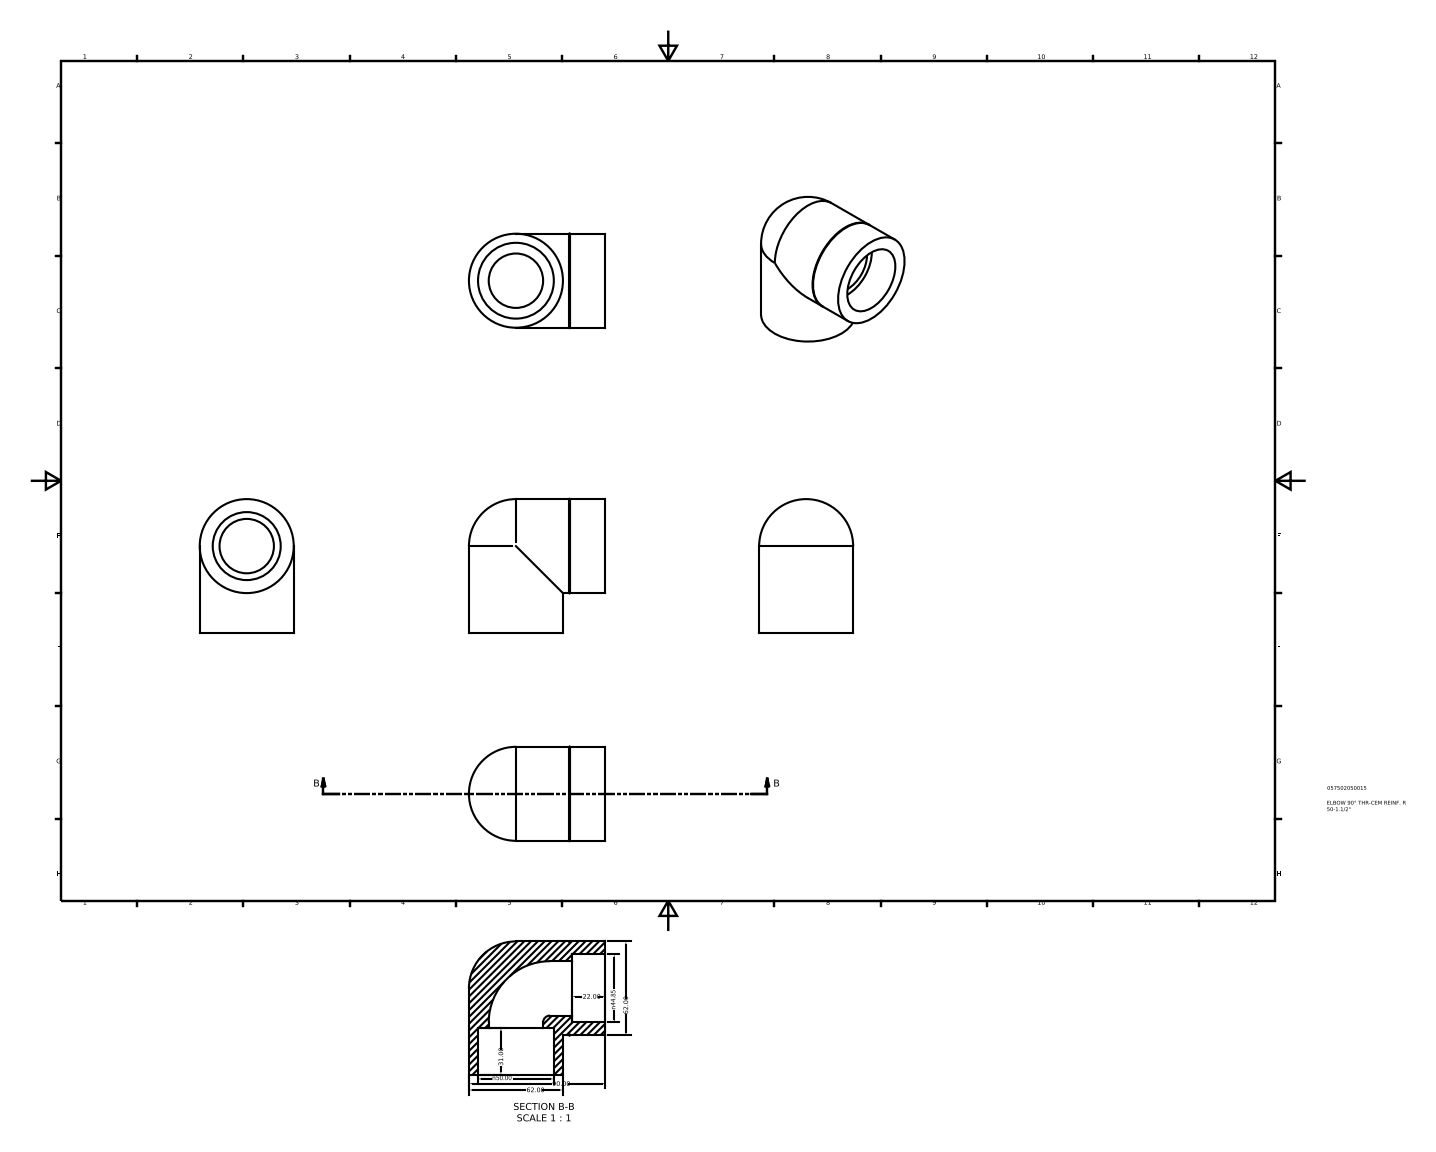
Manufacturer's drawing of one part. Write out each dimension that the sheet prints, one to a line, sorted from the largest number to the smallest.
90.00
62.00
62.00
n50.00
n44.85
31.00
22.00
